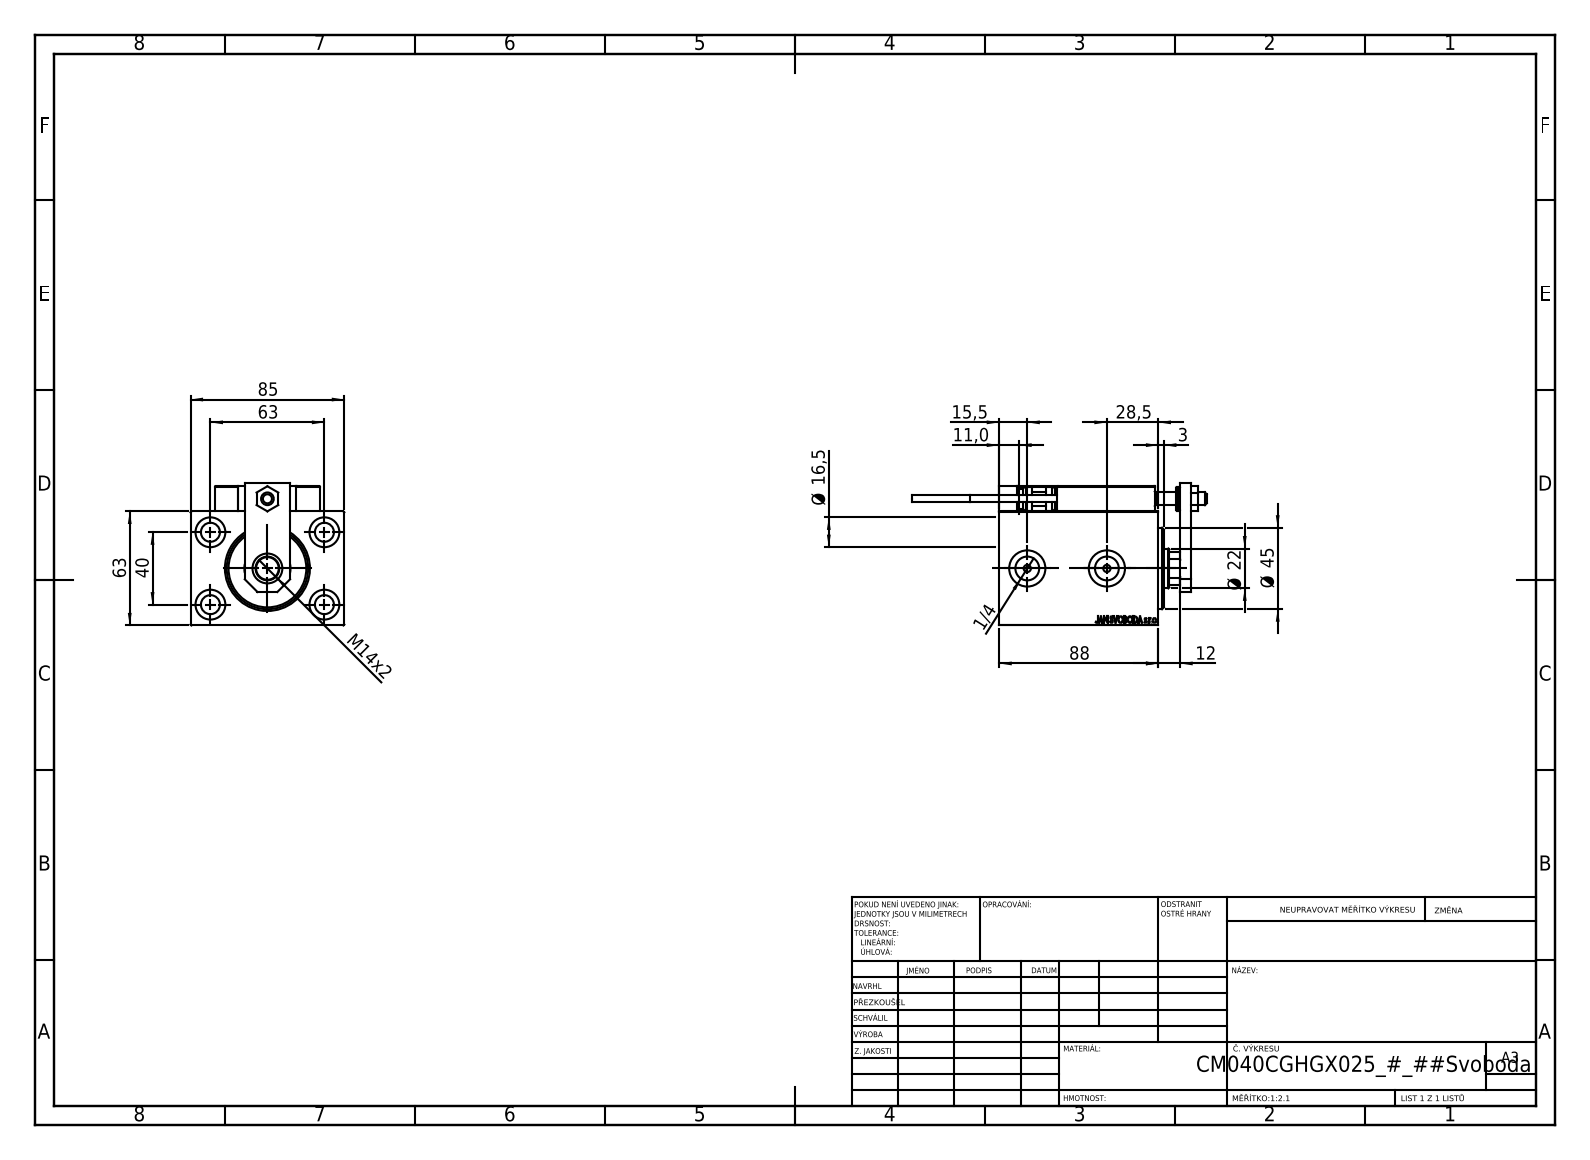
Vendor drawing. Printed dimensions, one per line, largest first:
88
85
63
63
Ø 45
40
28,5
Ø 22
Ø 16,5
15,5
M14x2
12
11,0
3
1/4
